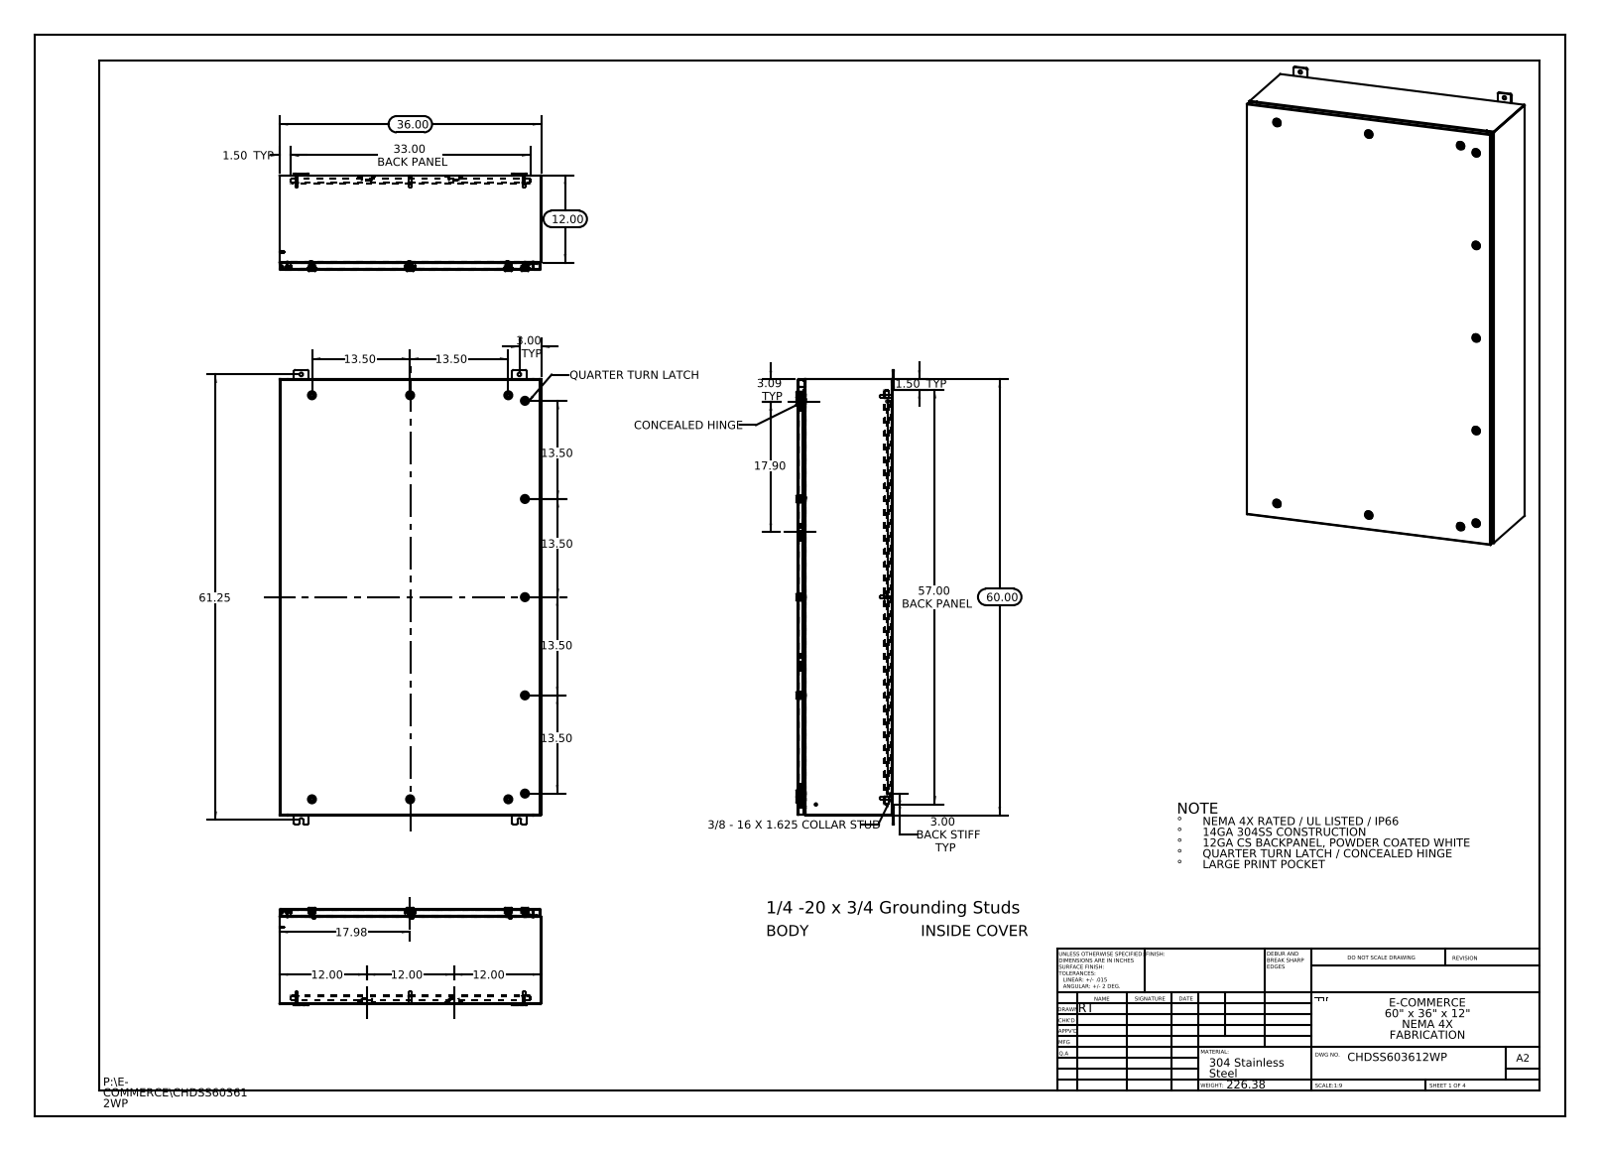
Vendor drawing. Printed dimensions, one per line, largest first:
61.25
60.00
57.00 BACK PANEL
36.00
33.00 BACK PANEL
17.98
17.90
13.50
13.50
13.50
13.50
13.50
13.50
12.00
12.00
12.00
12.00
3.09 TYP
3.00 TYP
3.00 BACK STIFF TYP
1.50 TYP
1.50 TYP
